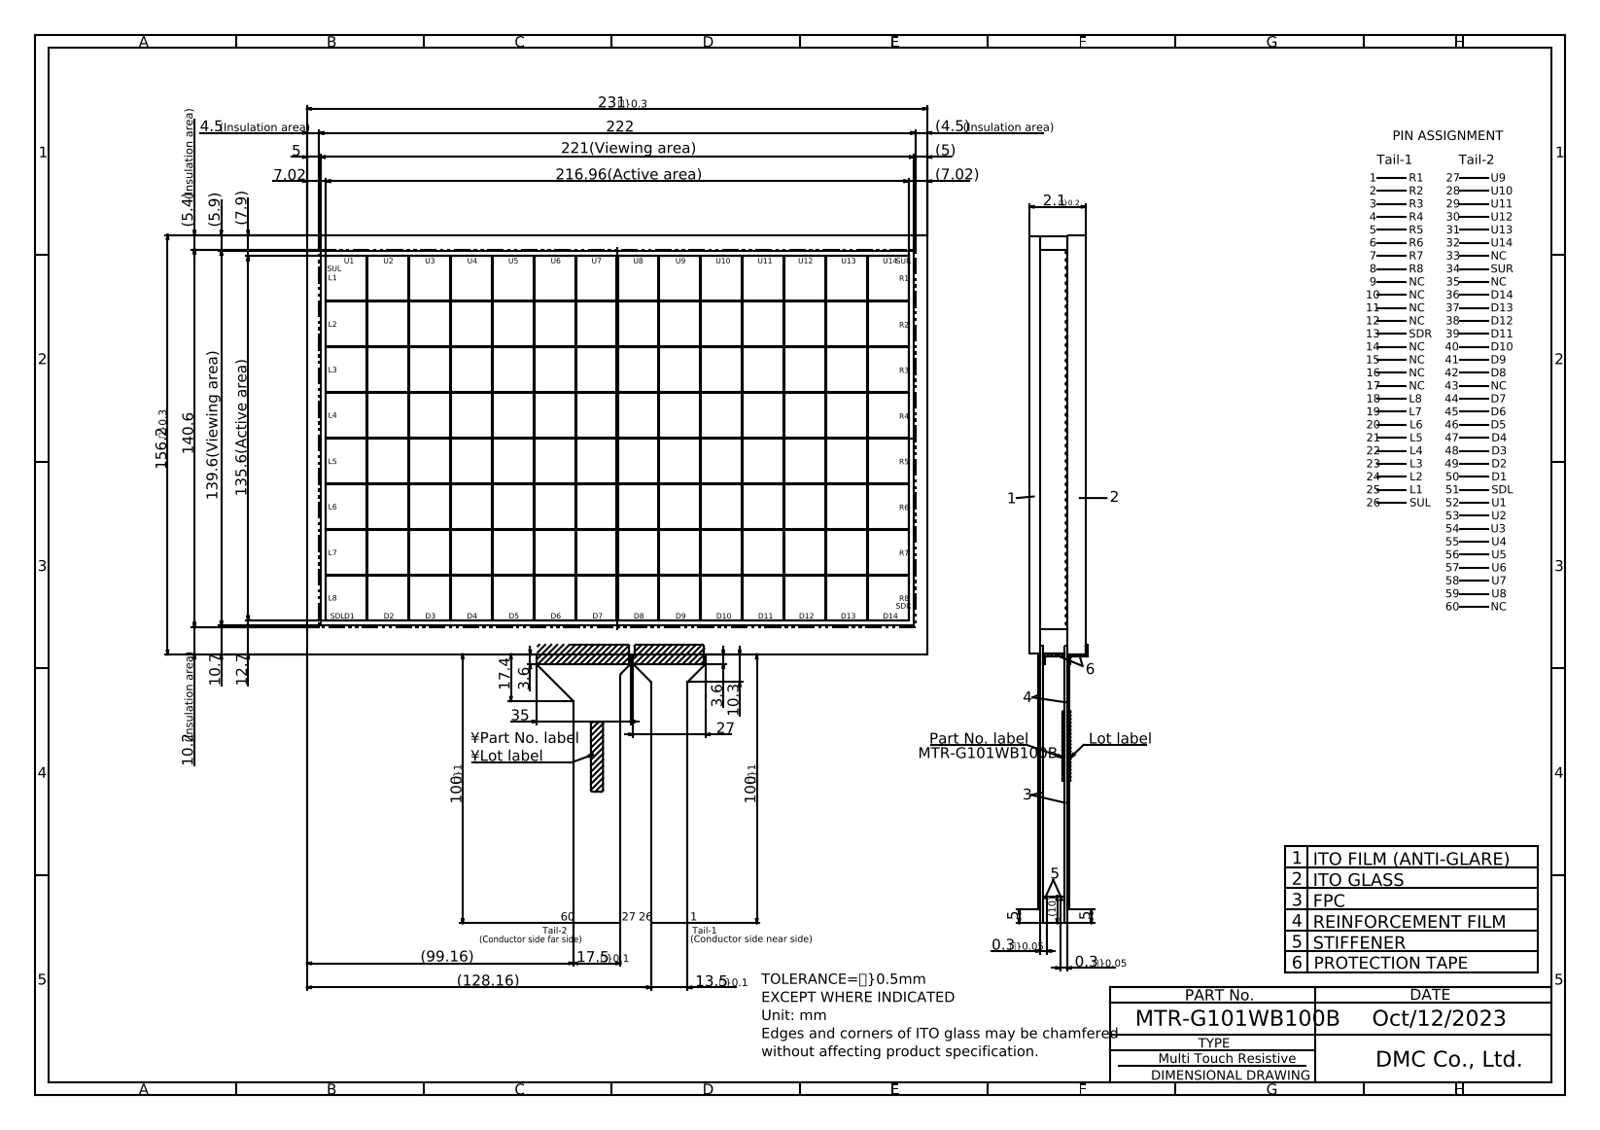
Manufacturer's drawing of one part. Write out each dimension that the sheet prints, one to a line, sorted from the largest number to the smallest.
231.00
222
221(Viewing area)
216.96(Active area)
156.20
140.6
139.6(Viewing area)
135.6(Active area)
(128.16)
100.00
100.00
(99.16)
35
27
17.50
17.4
13.50
12.7
10.7
10.3
10.20{\H0.75x;(Insulation area)}
(10)
(7.9)
(7.02)
7.02
(5.9)
(5.40){\H0.75x;(Insulation area)}
(5)
5
5
5
(4.50){\H0.75x;(Insulation area)}
4.50{\H0.75x;(Insulation area)}
3.6
3.6
2.1{\H0.5x;?}0.2}
0.3{\H0.66667x;?}0.05}
0.3{\H0.66667x;?}0.05}
